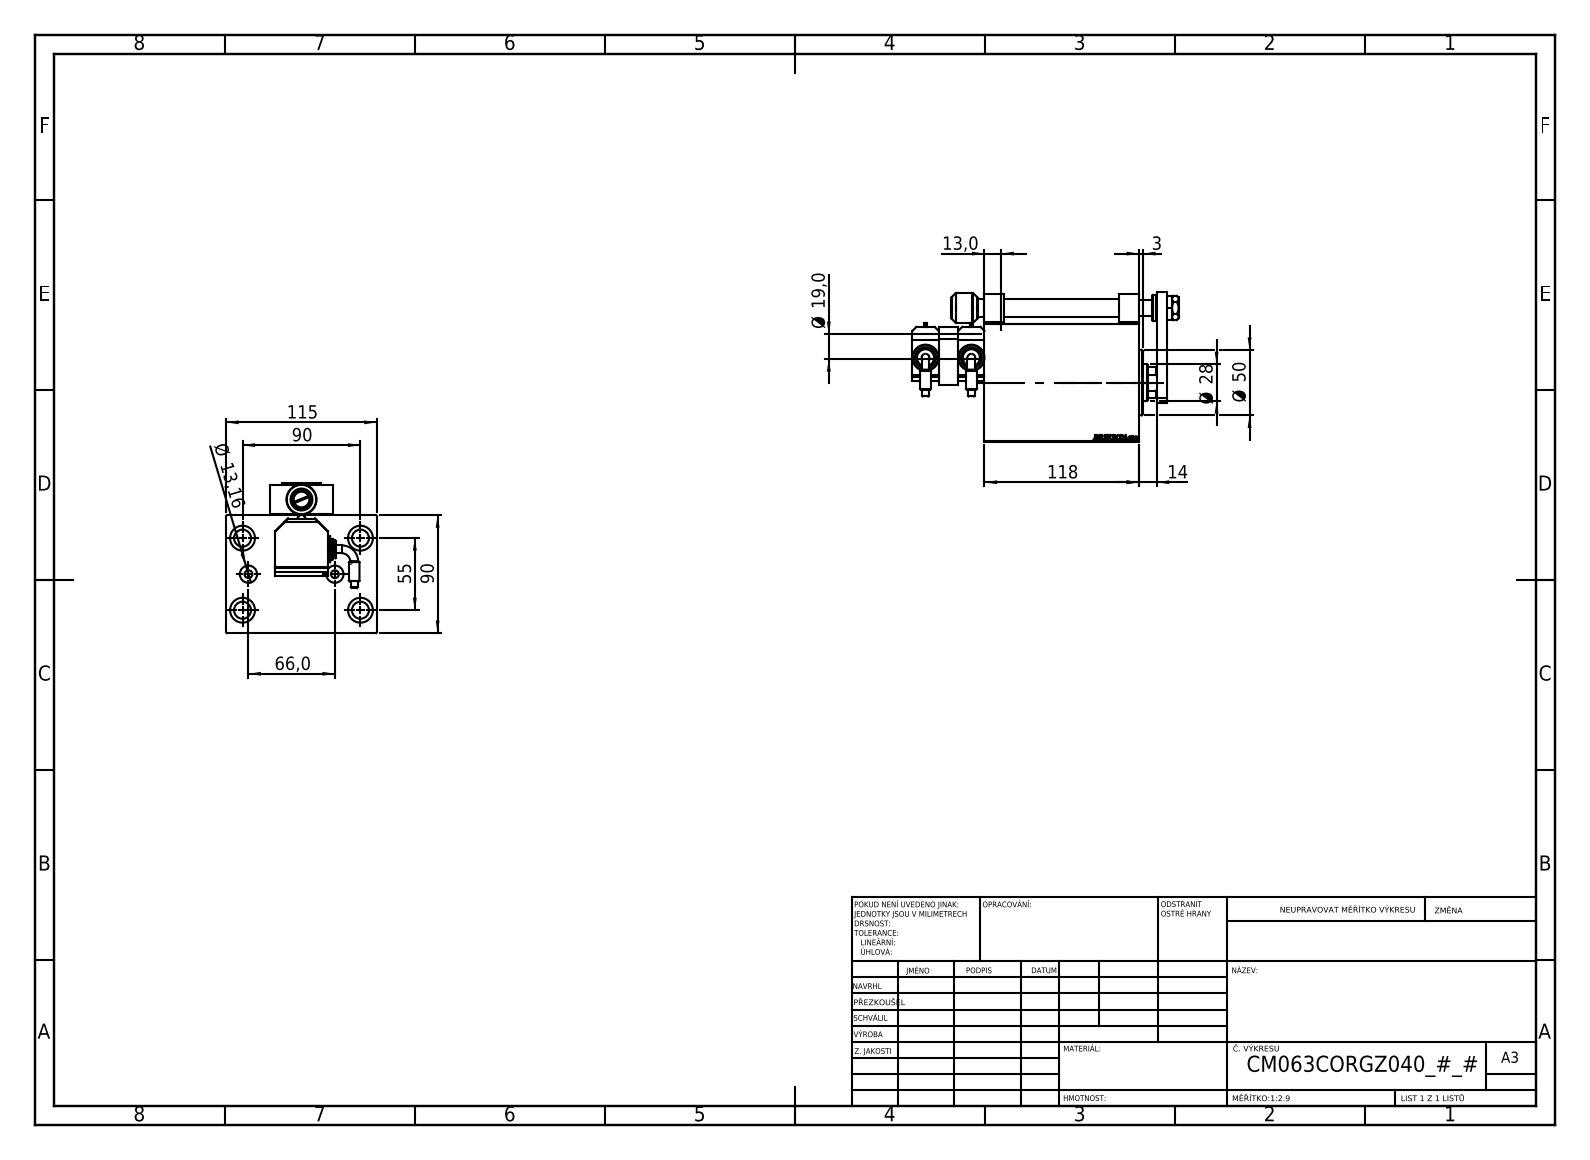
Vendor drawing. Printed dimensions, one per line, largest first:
118
115
90
90
66,0
55
Ø 50
Ø 28
Ø 19,0
14
Ø 13,16
13,0
3
